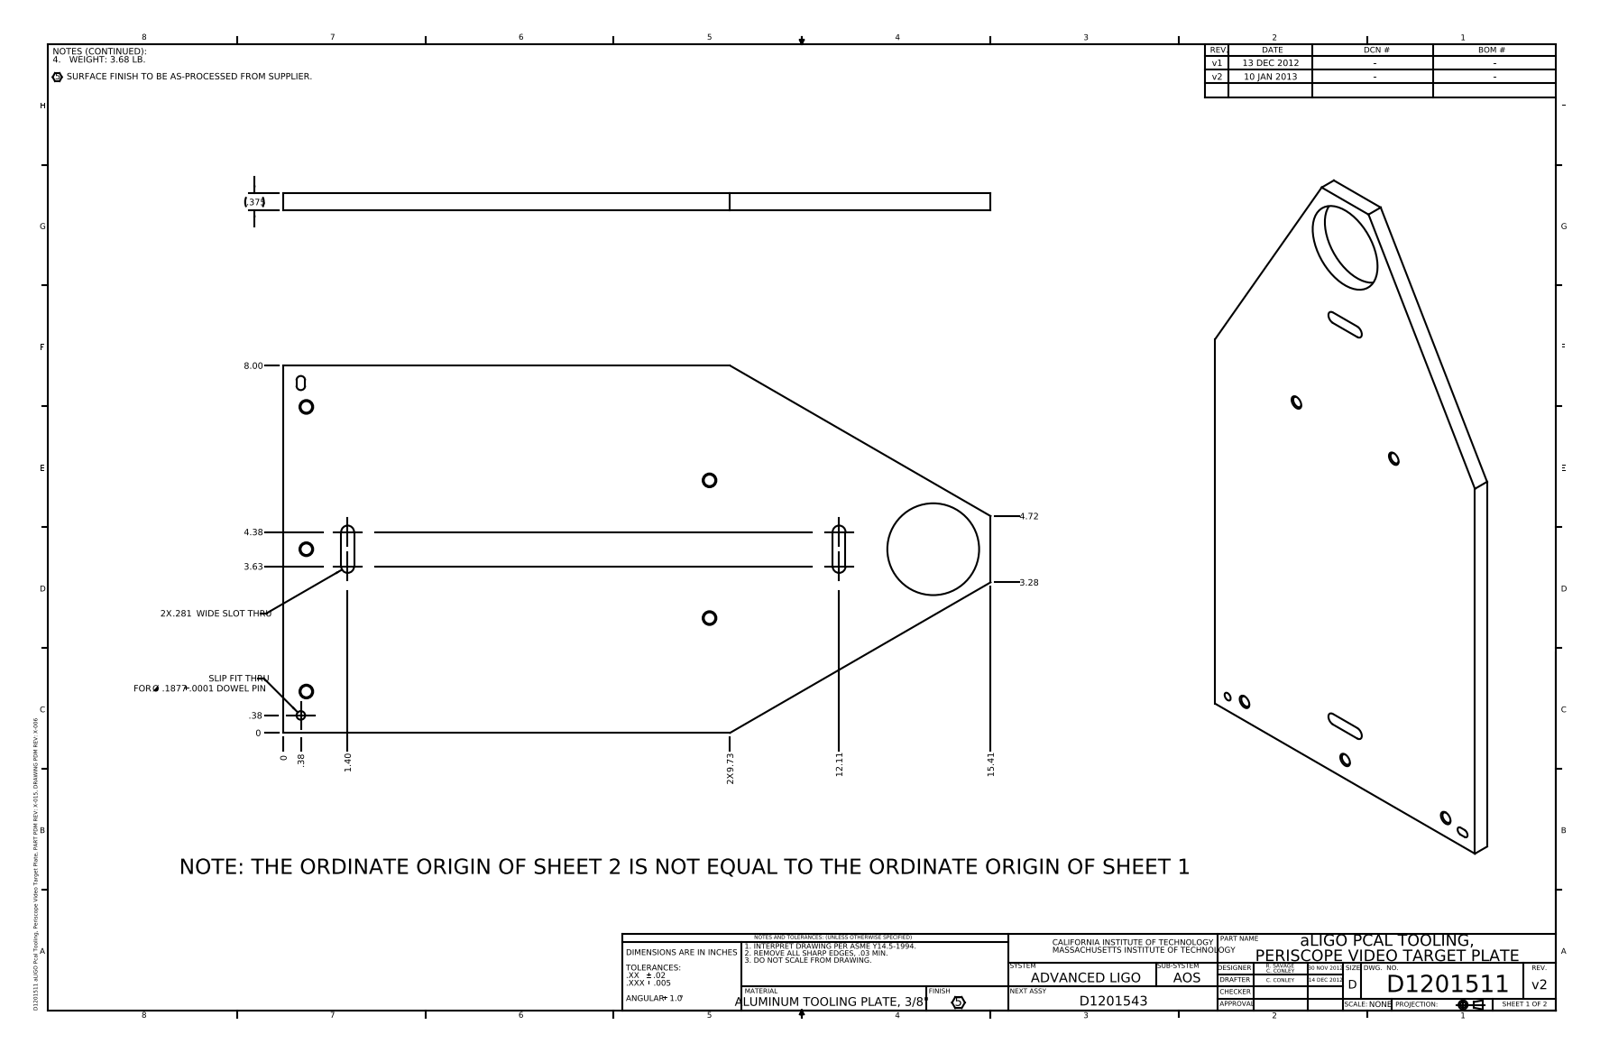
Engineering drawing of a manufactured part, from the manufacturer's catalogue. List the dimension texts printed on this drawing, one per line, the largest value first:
15.41
12.11
2X 9.73
8.00
4.72
4.38
3.63
3.28
1.40
.38
.38
.375
2X .281 WIDE SLOT THRU
0
0
